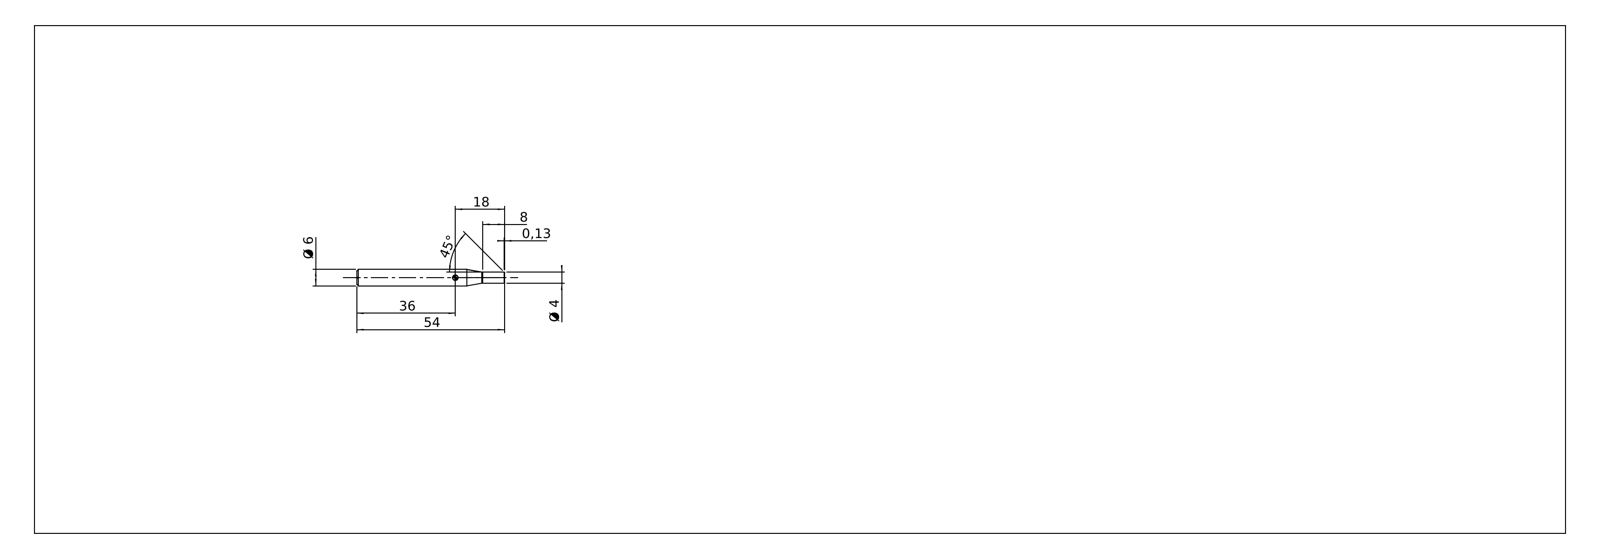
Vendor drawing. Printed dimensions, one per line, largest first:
54
45°
36
18
8
Ø 6
Ø 4
0,13
